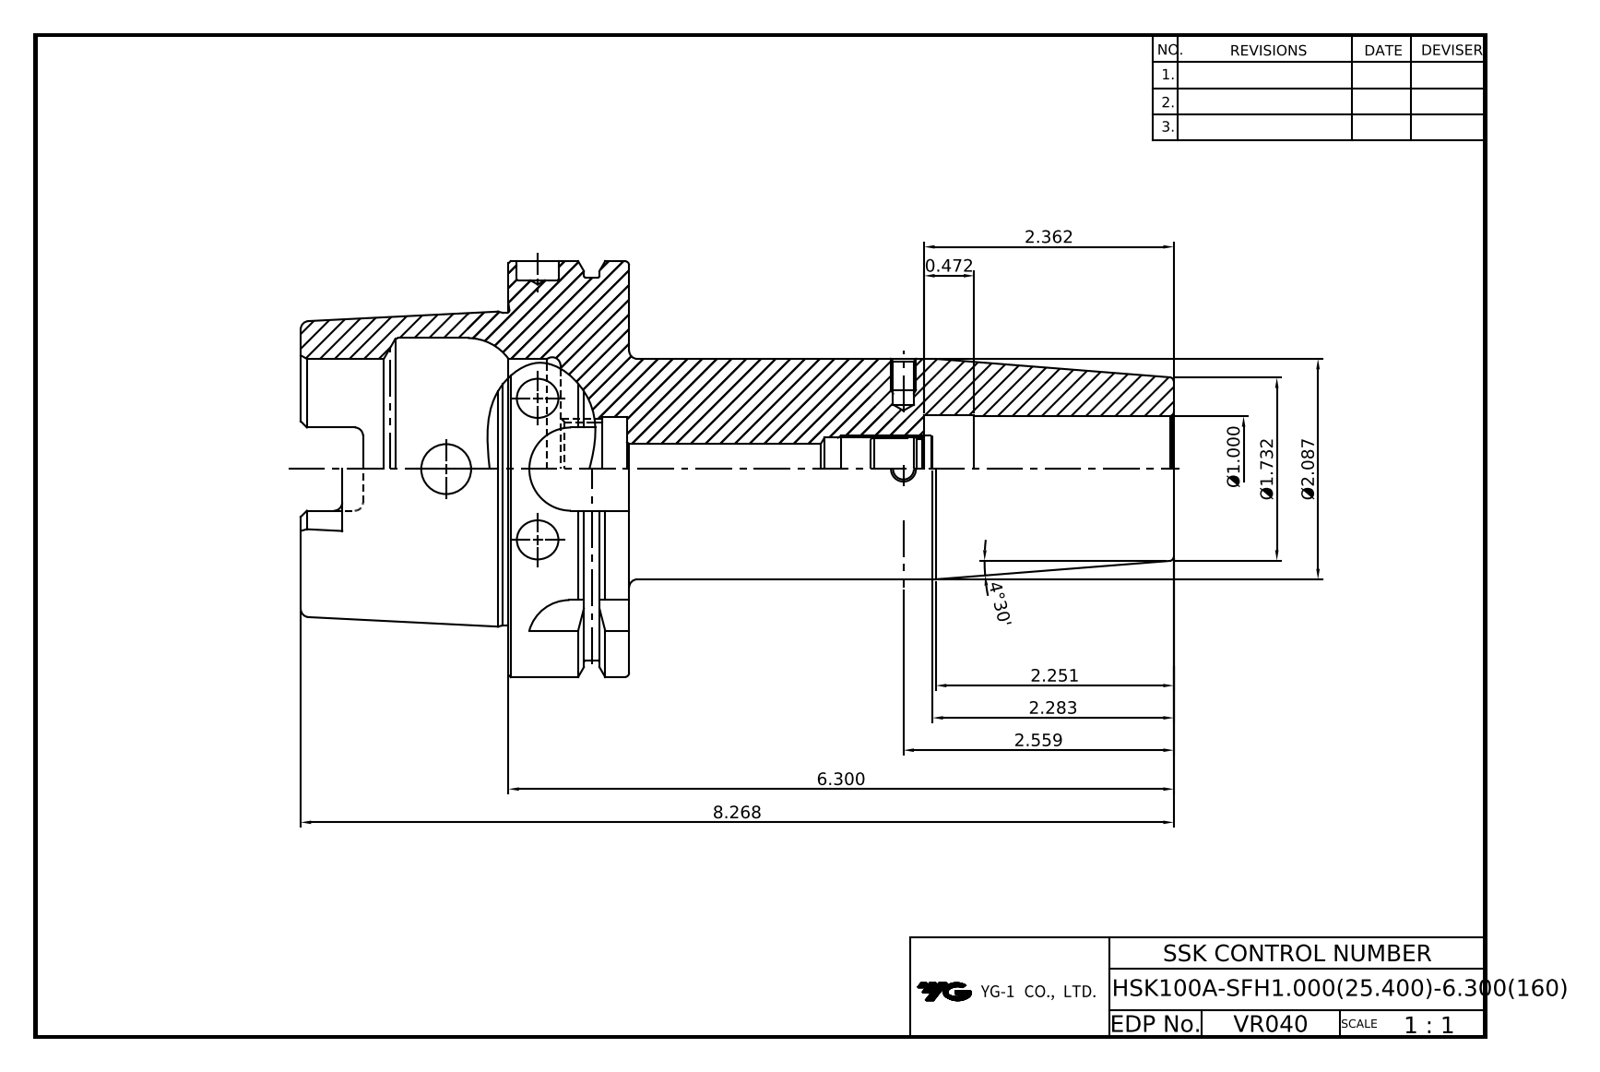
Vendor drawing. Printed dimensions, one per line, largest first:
8.268
6.300
4°30'
2.559
2.362
2.283
2.251
Ø2.087
Ø1.732
Ø1.000
0.472
